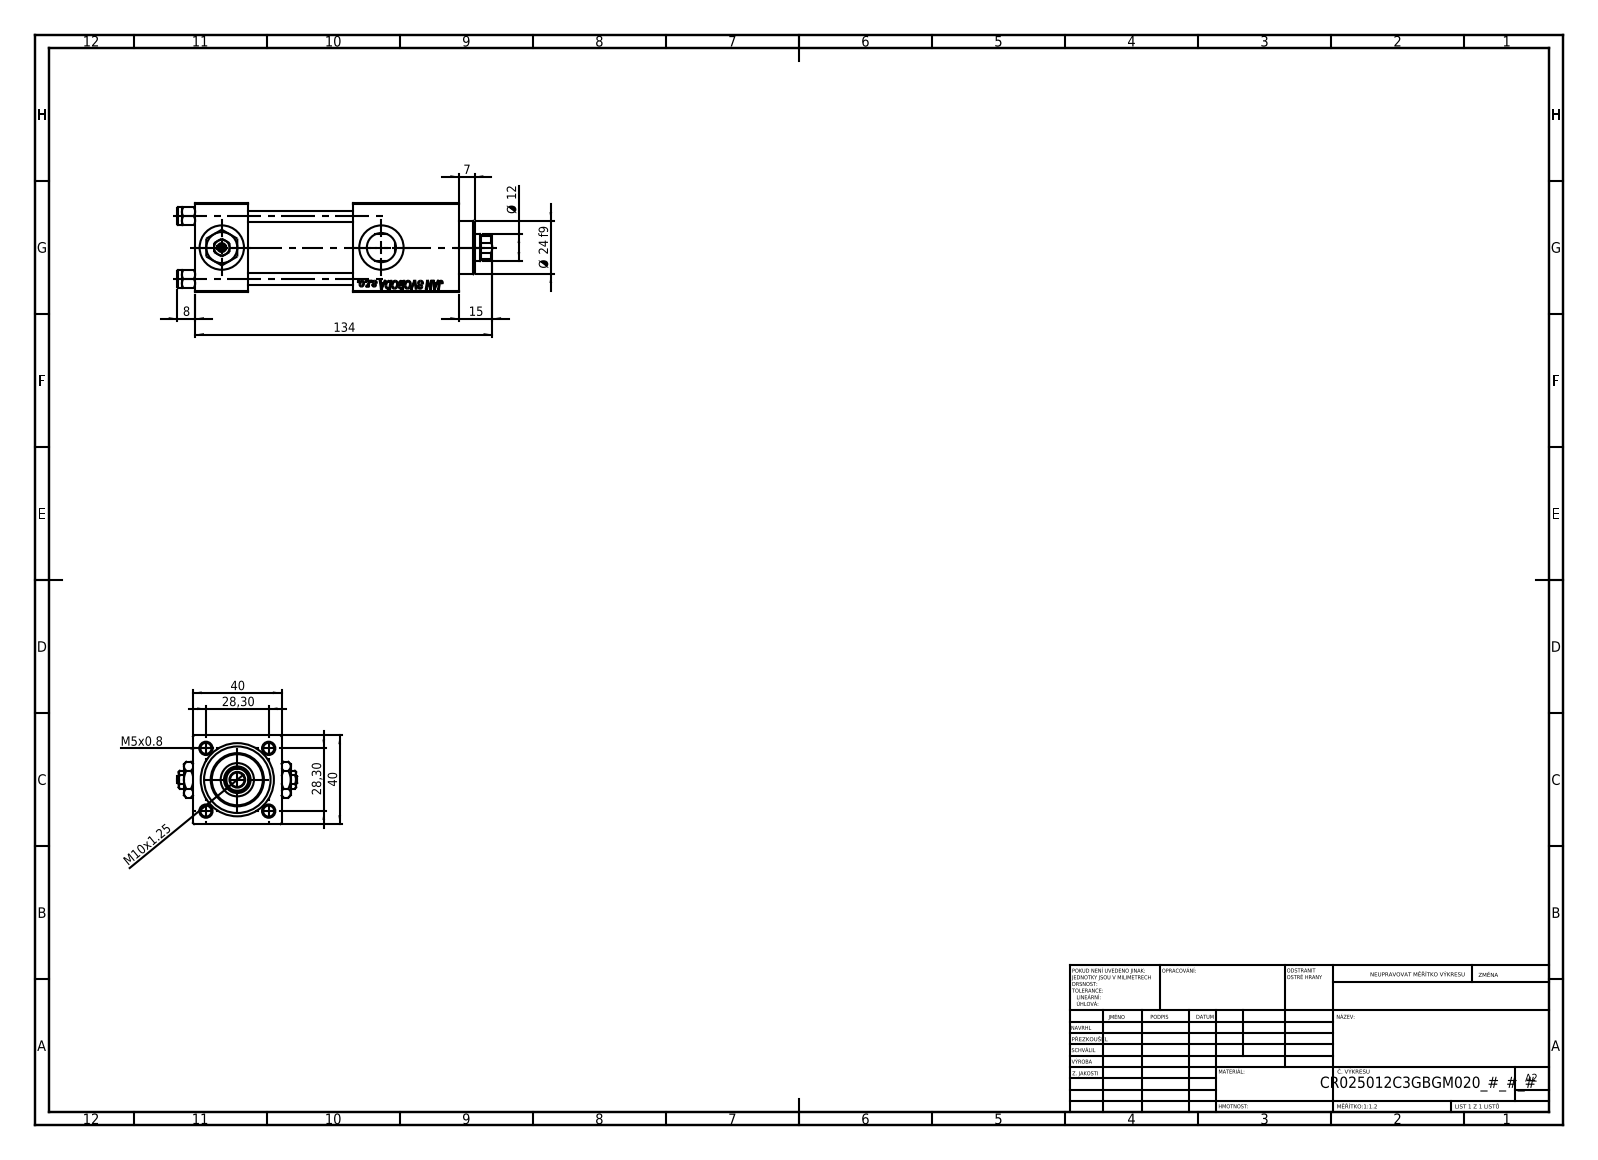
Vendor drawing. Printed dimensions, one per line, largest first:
134
40
40
28,30
28,30
Ø 24 f9
15
Ø 12
M10x1.25
8
7
M5x0.8
